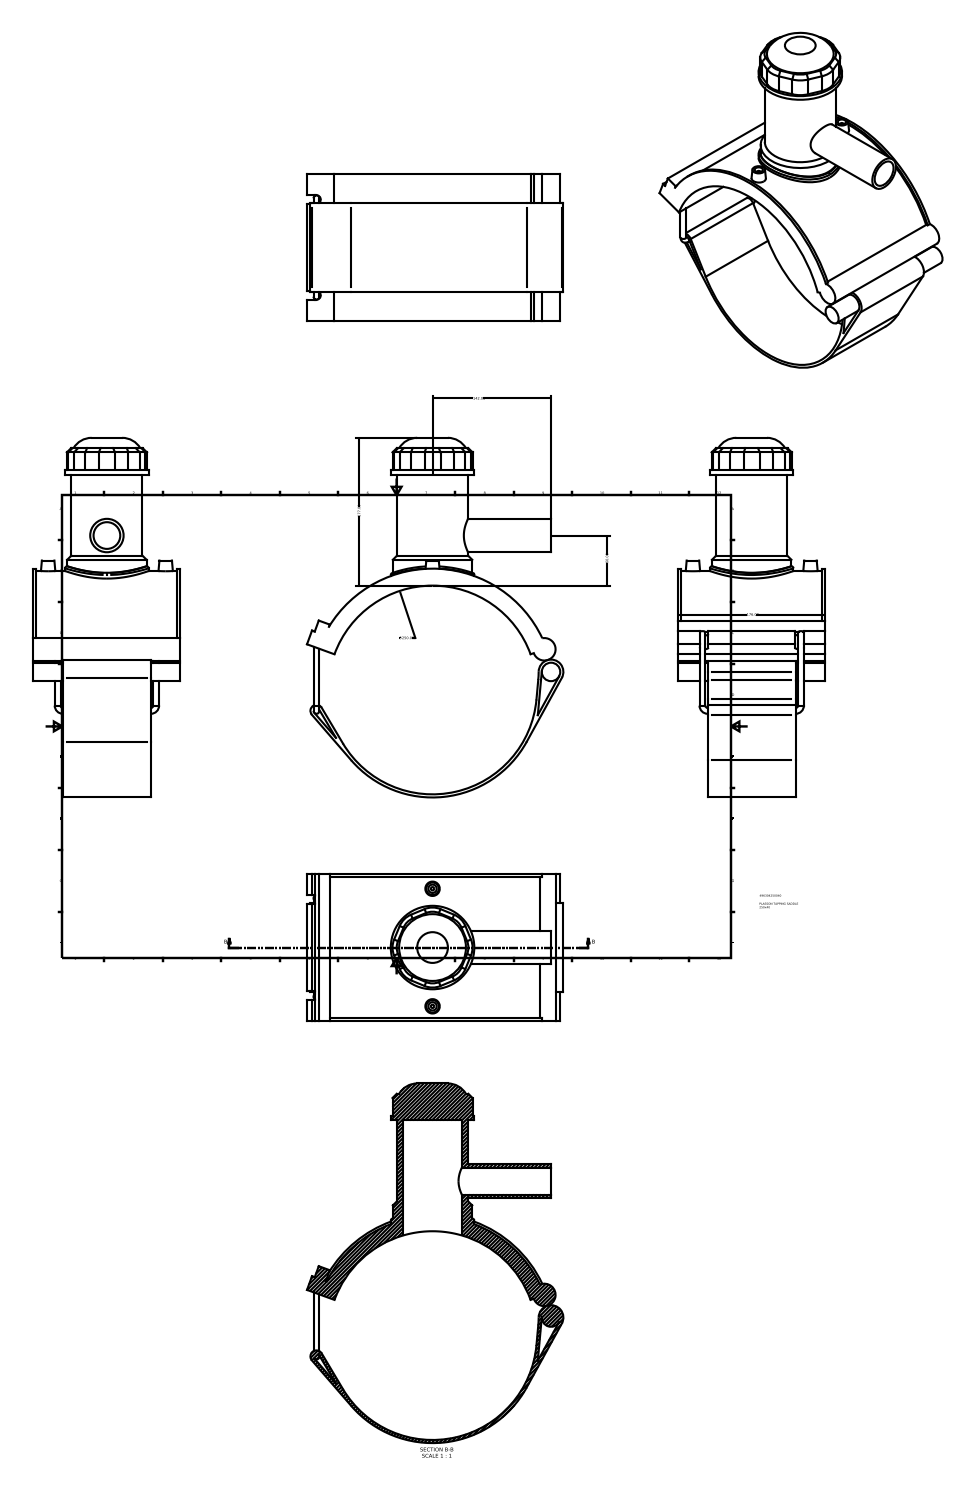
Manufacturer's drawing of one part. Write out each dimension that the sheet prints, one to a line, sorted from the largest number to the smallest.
∅250.00
177.00
176.00
142.00
60.00
